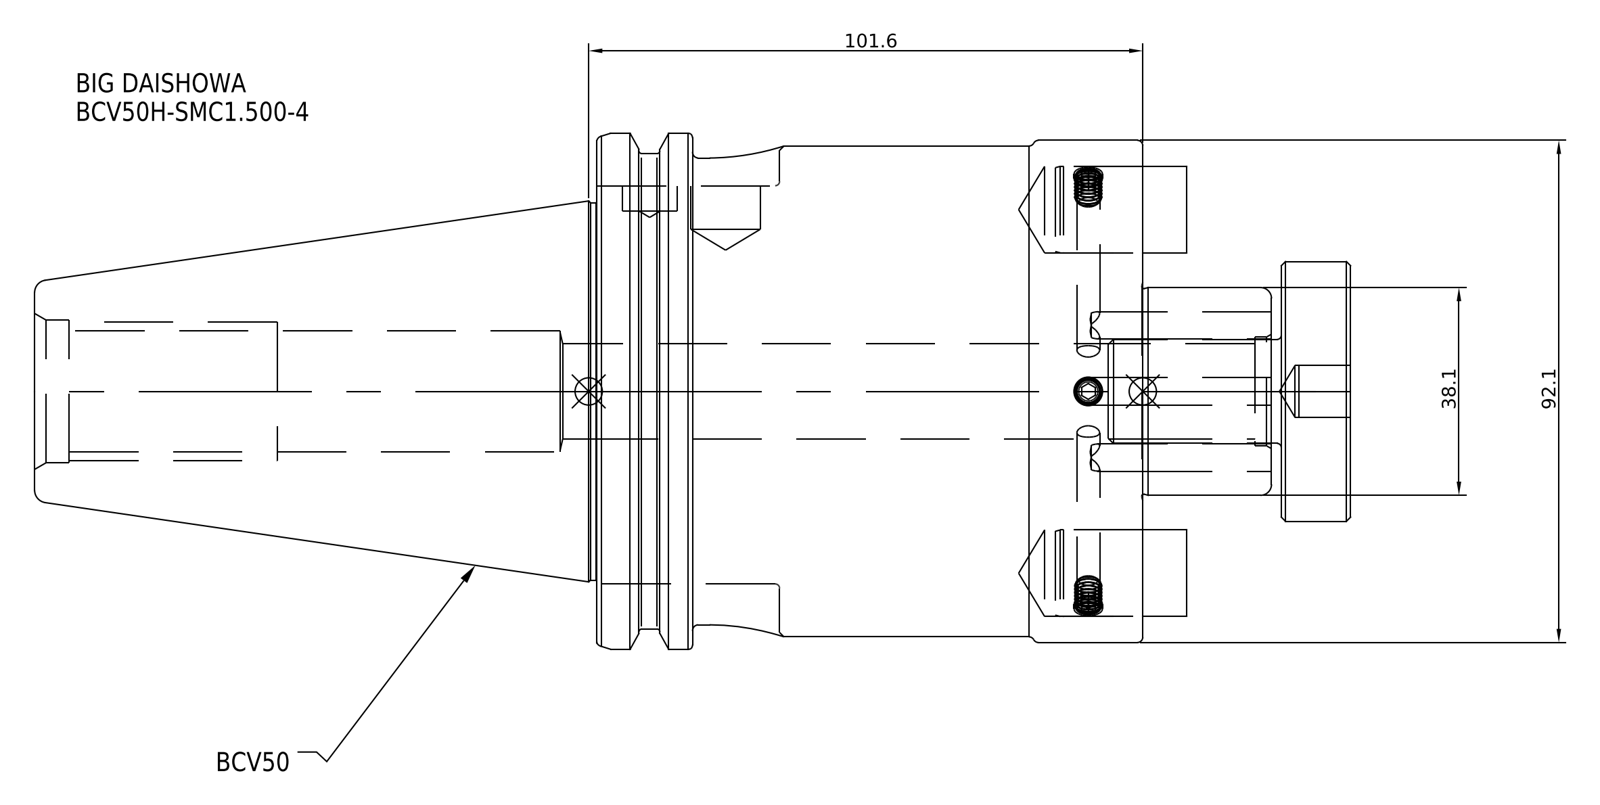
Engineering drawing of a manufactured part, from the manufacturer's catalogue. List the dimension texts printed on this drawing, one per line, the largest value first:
101.6
92.1
38.1
